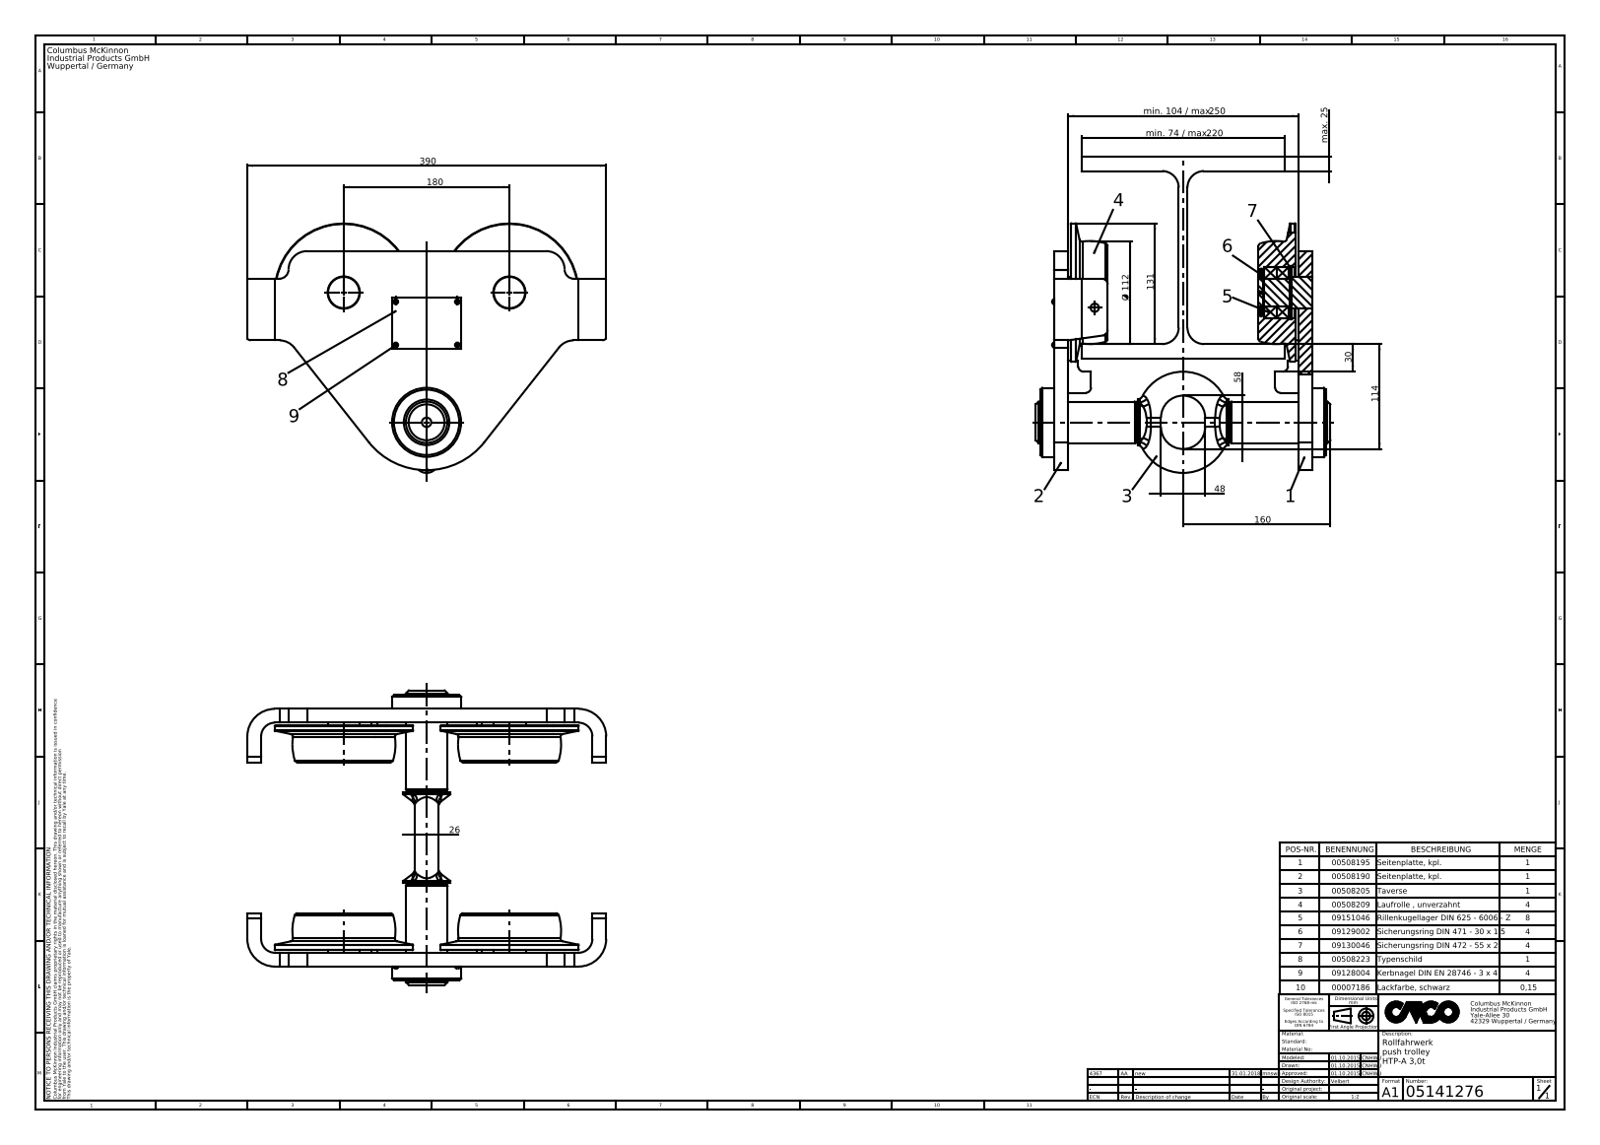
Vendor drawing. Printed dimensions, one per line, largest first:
390
180
160
131
114
Ø 112
min. 104 / max. 250
min. 74 / max. 220
58
48
30
26
max. 25
